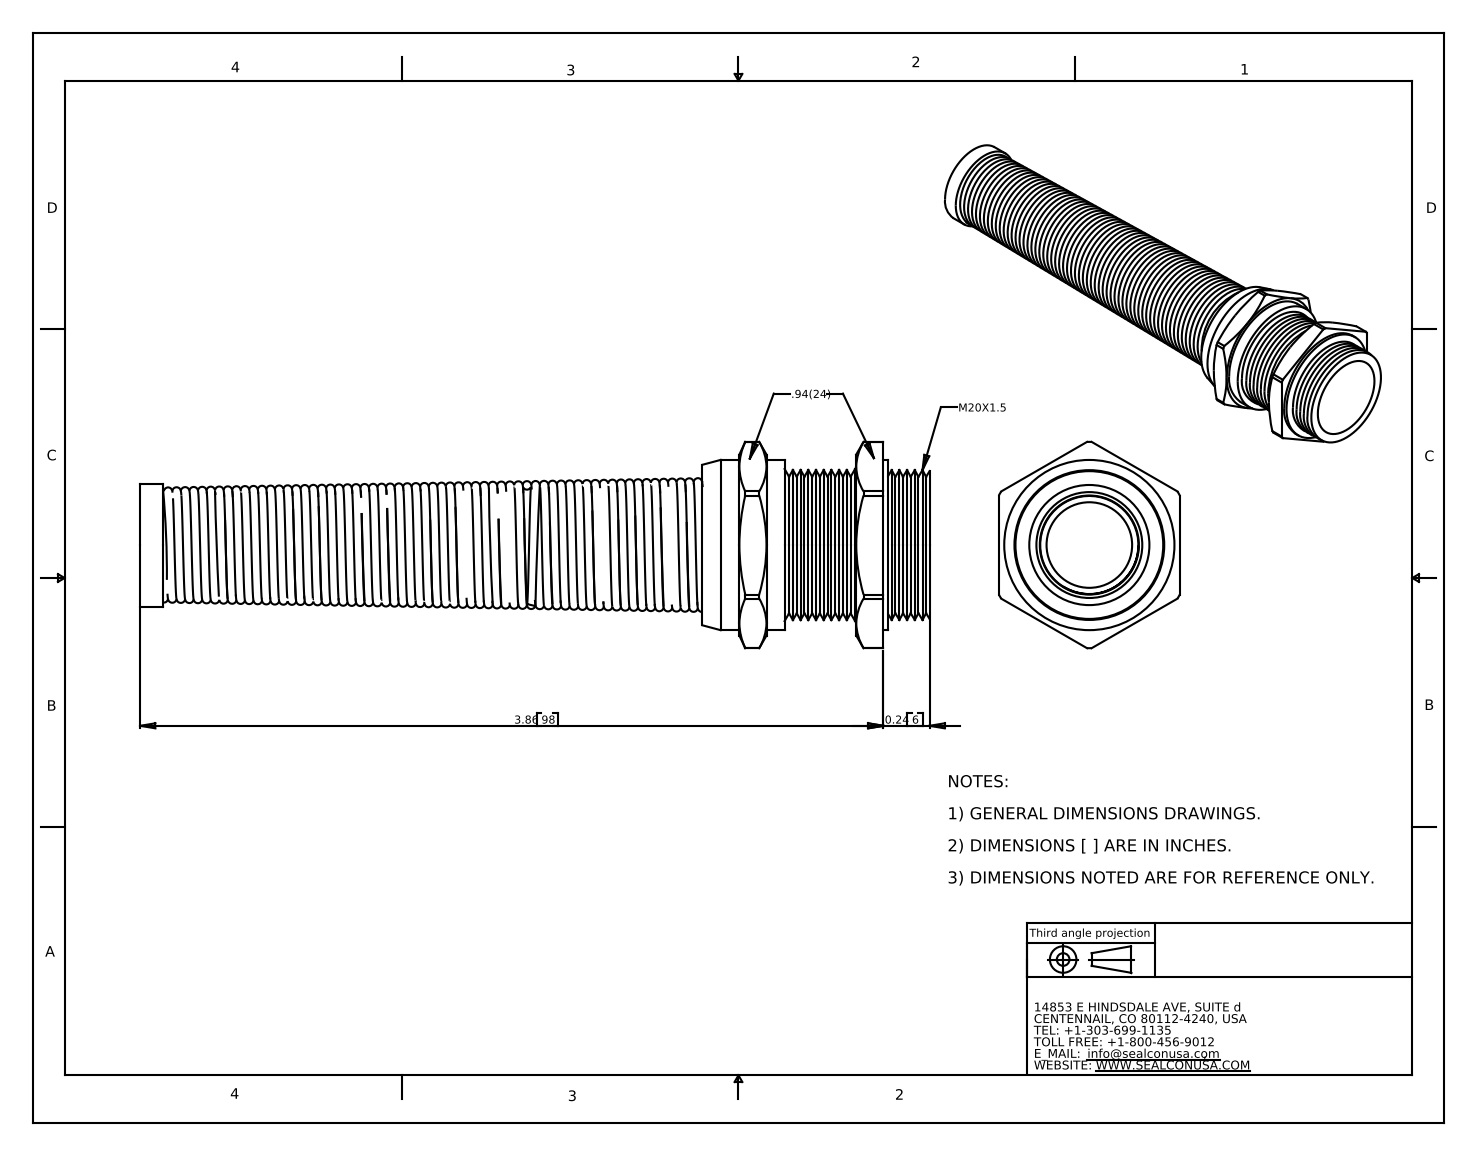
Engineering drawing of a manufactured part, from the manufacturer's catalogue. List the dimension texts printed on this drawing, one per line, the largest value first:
3.86 98
0.24 6
